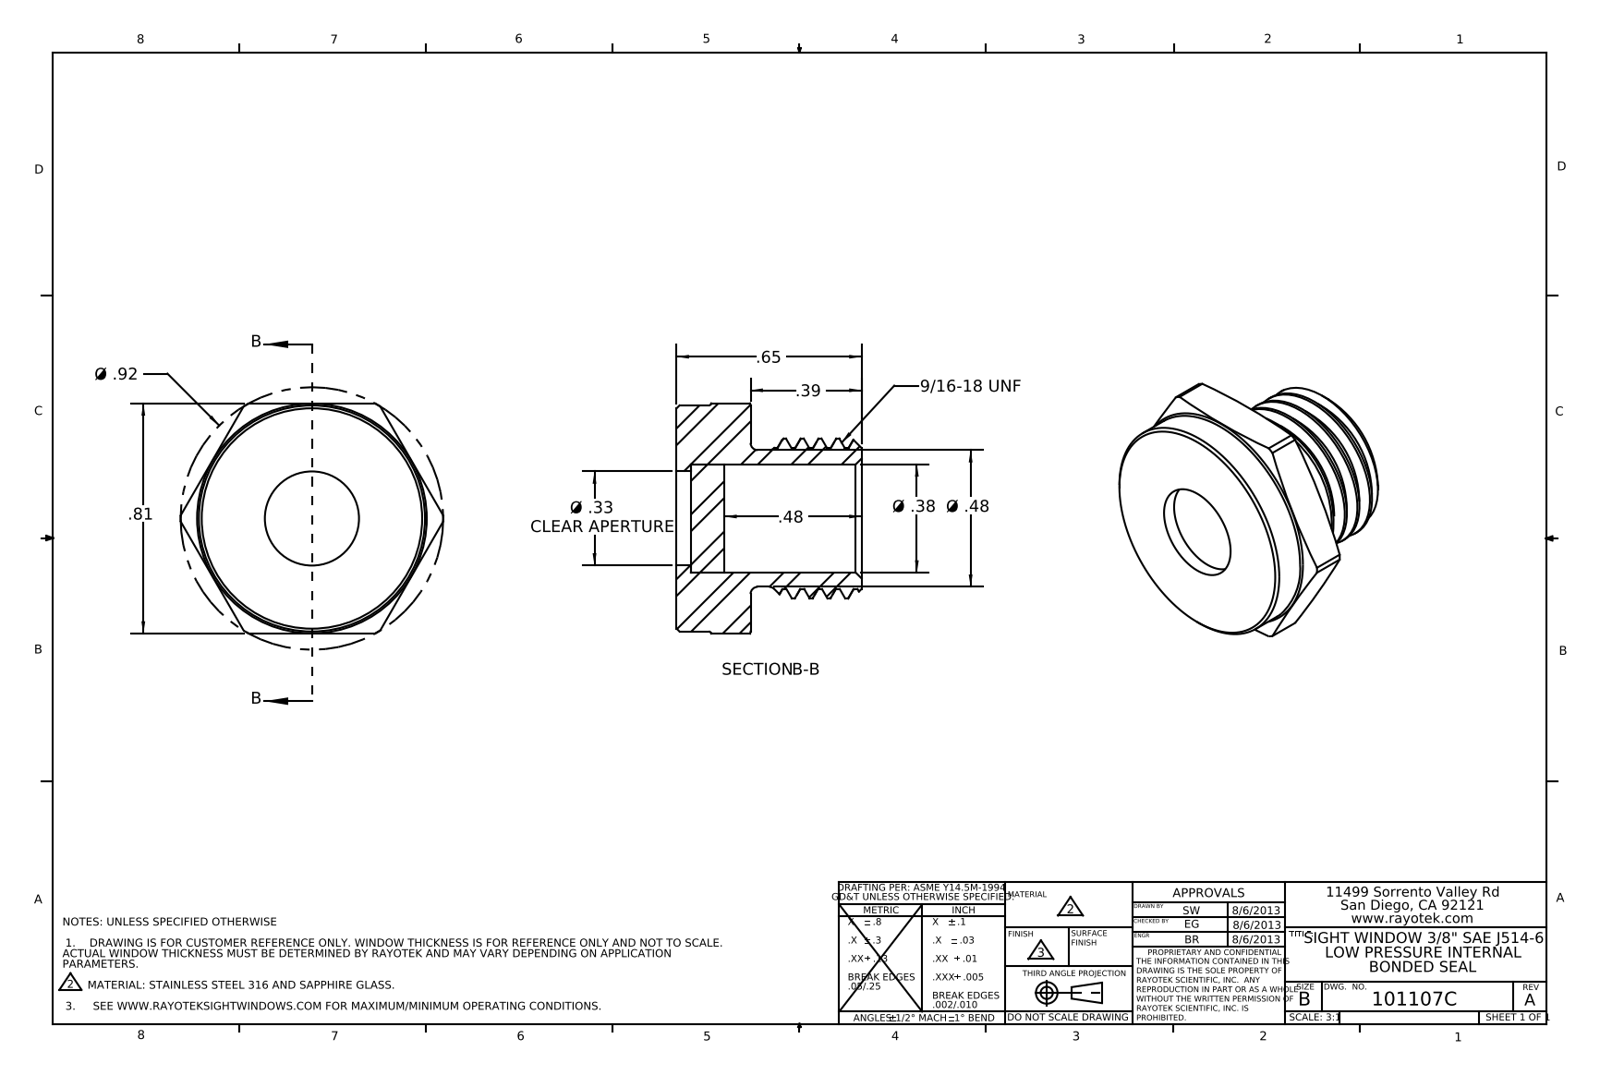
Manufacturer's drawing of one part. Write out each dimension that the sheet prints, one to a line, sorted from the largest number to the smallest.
Ø .92
.81
.65
.48
Ø .48
.39
Ø .38
Ø .33 CLEAR APERTURE
